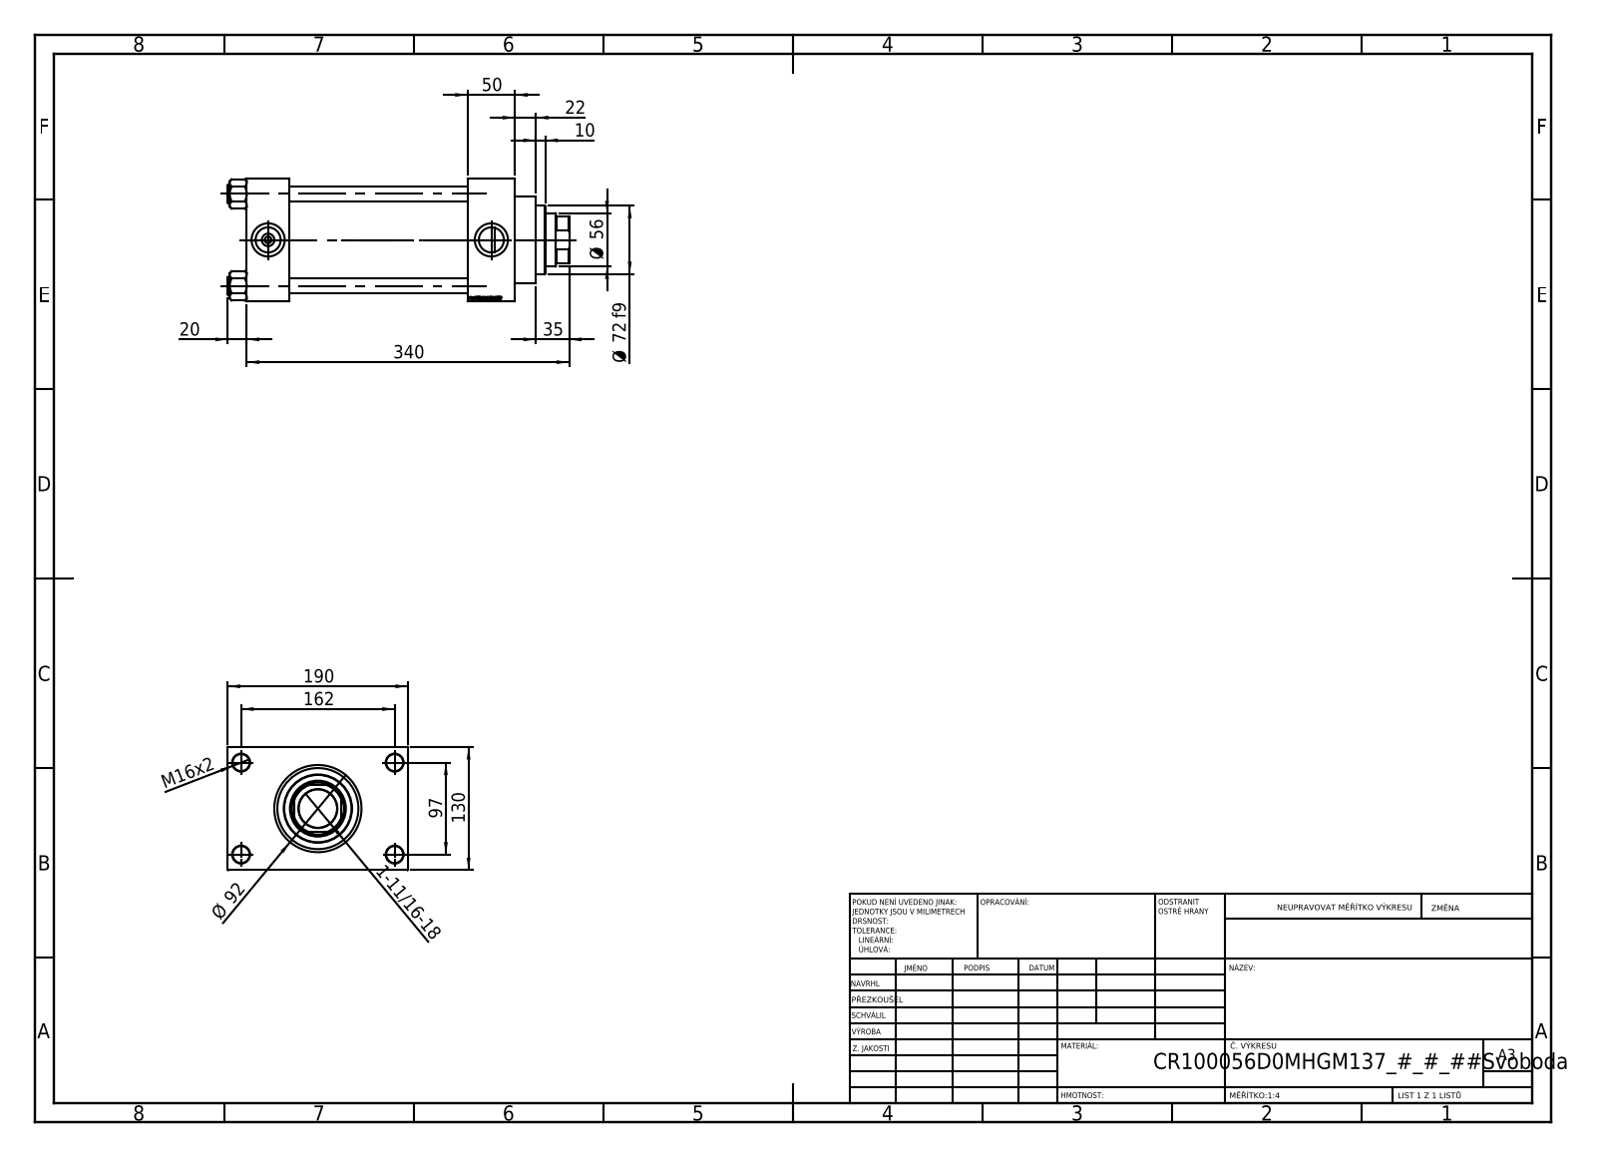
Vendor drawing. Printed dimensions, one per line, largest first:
340
190
162
130
97
Ø 92
Ø 72 f9
Ø 56
50
35
22
20
M16x2
10
1-11/16-18
